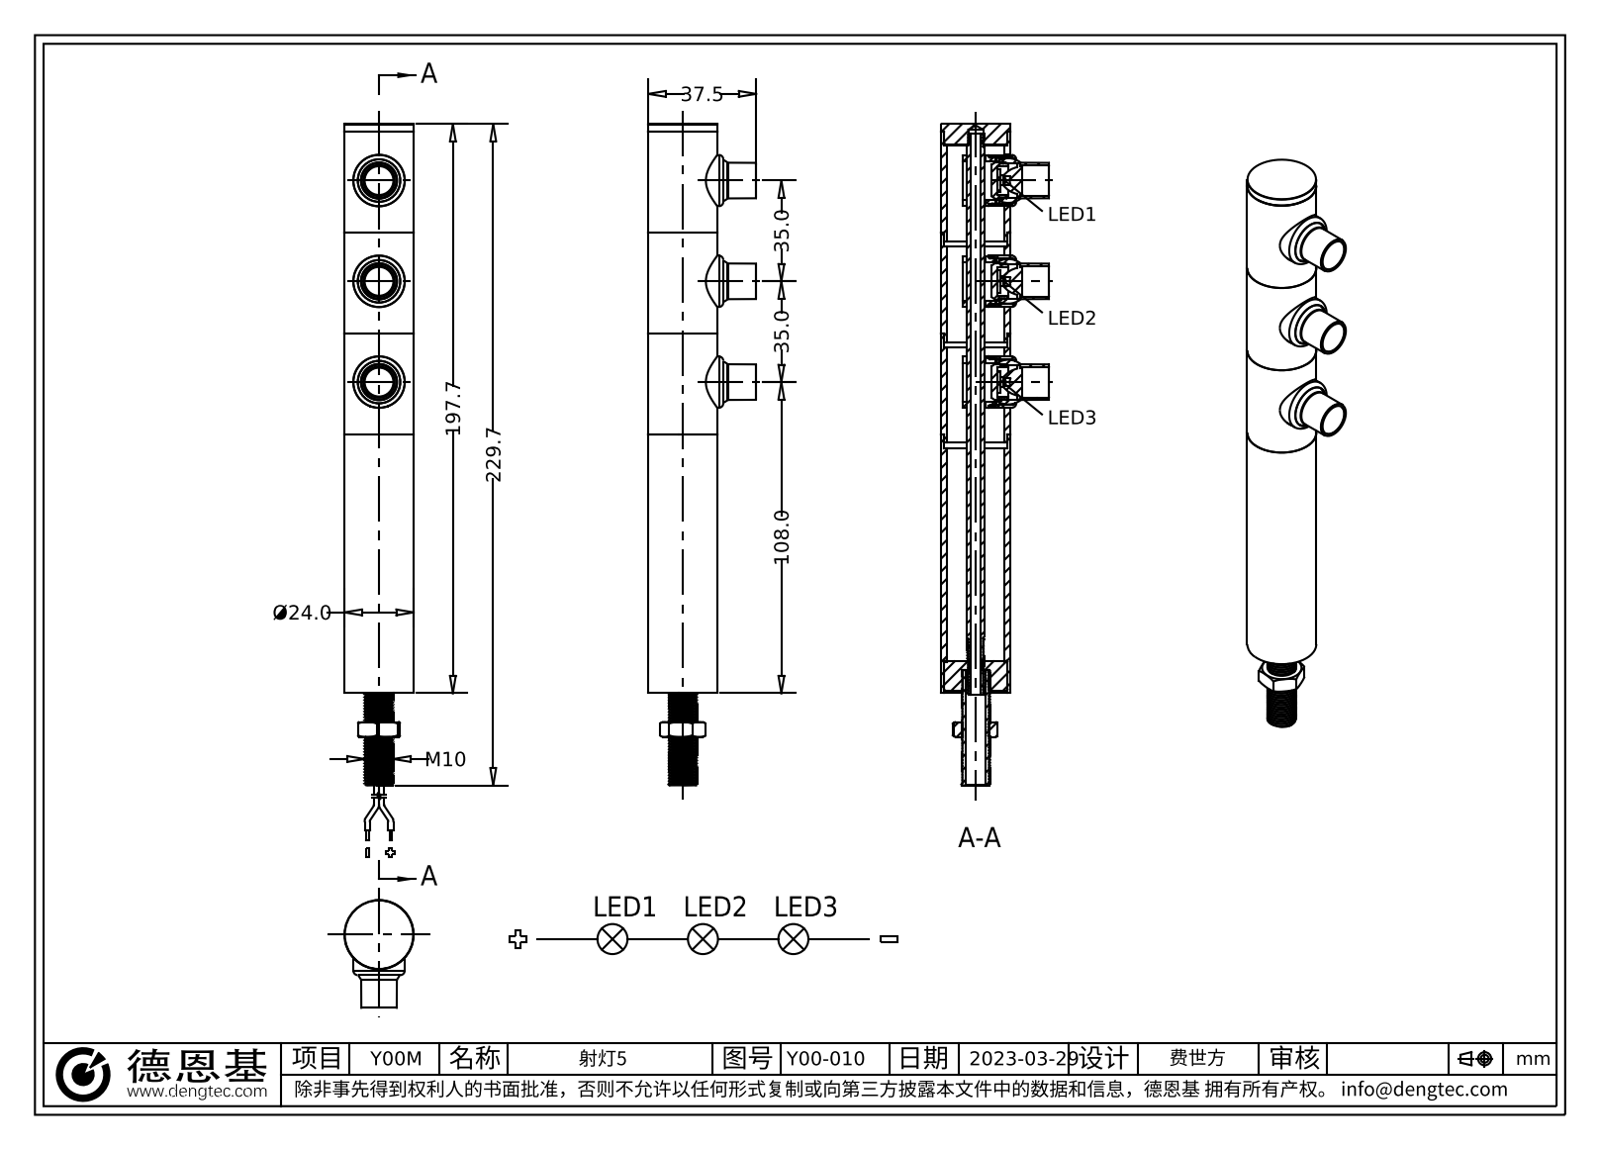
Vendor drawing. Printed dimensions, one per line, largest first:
229.7
197.7
108.0
37.5
35.0
35.0
Ø24.0
M10
